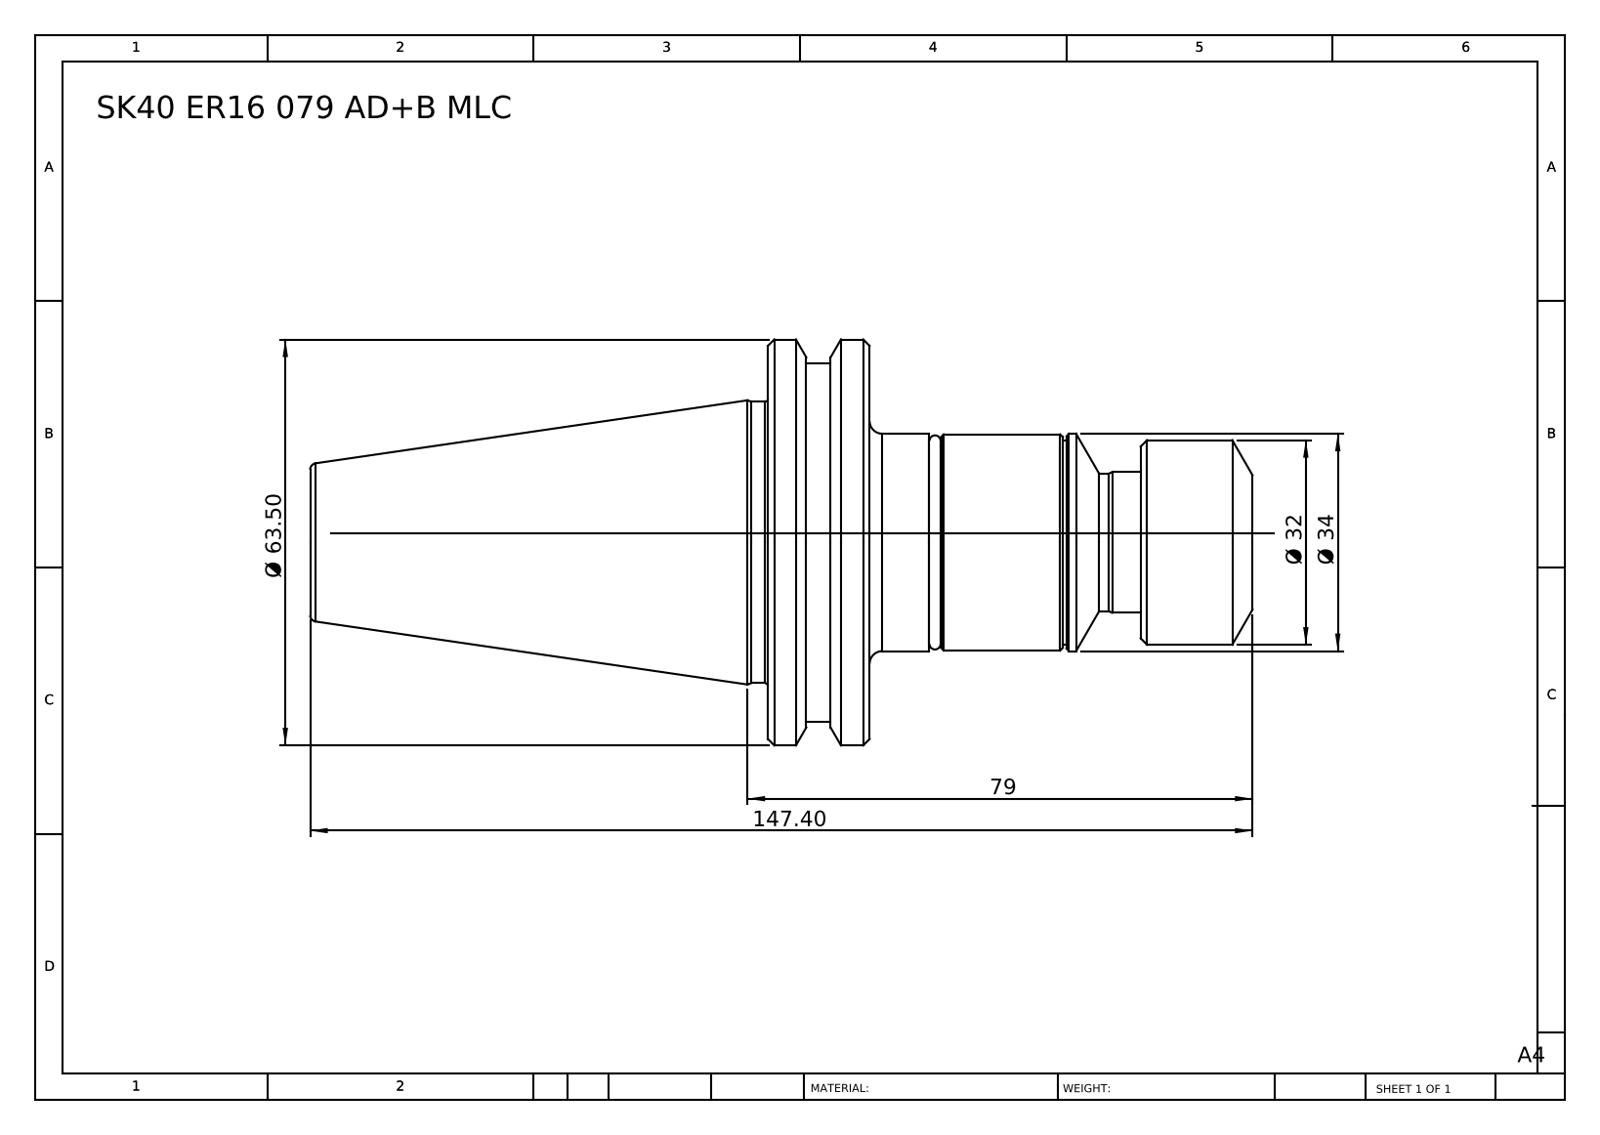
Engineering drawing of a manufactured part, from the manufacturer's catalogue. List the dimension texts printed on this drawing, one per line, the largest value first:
147.40
79
Ø 63.50
Ø 34
Ø 32
